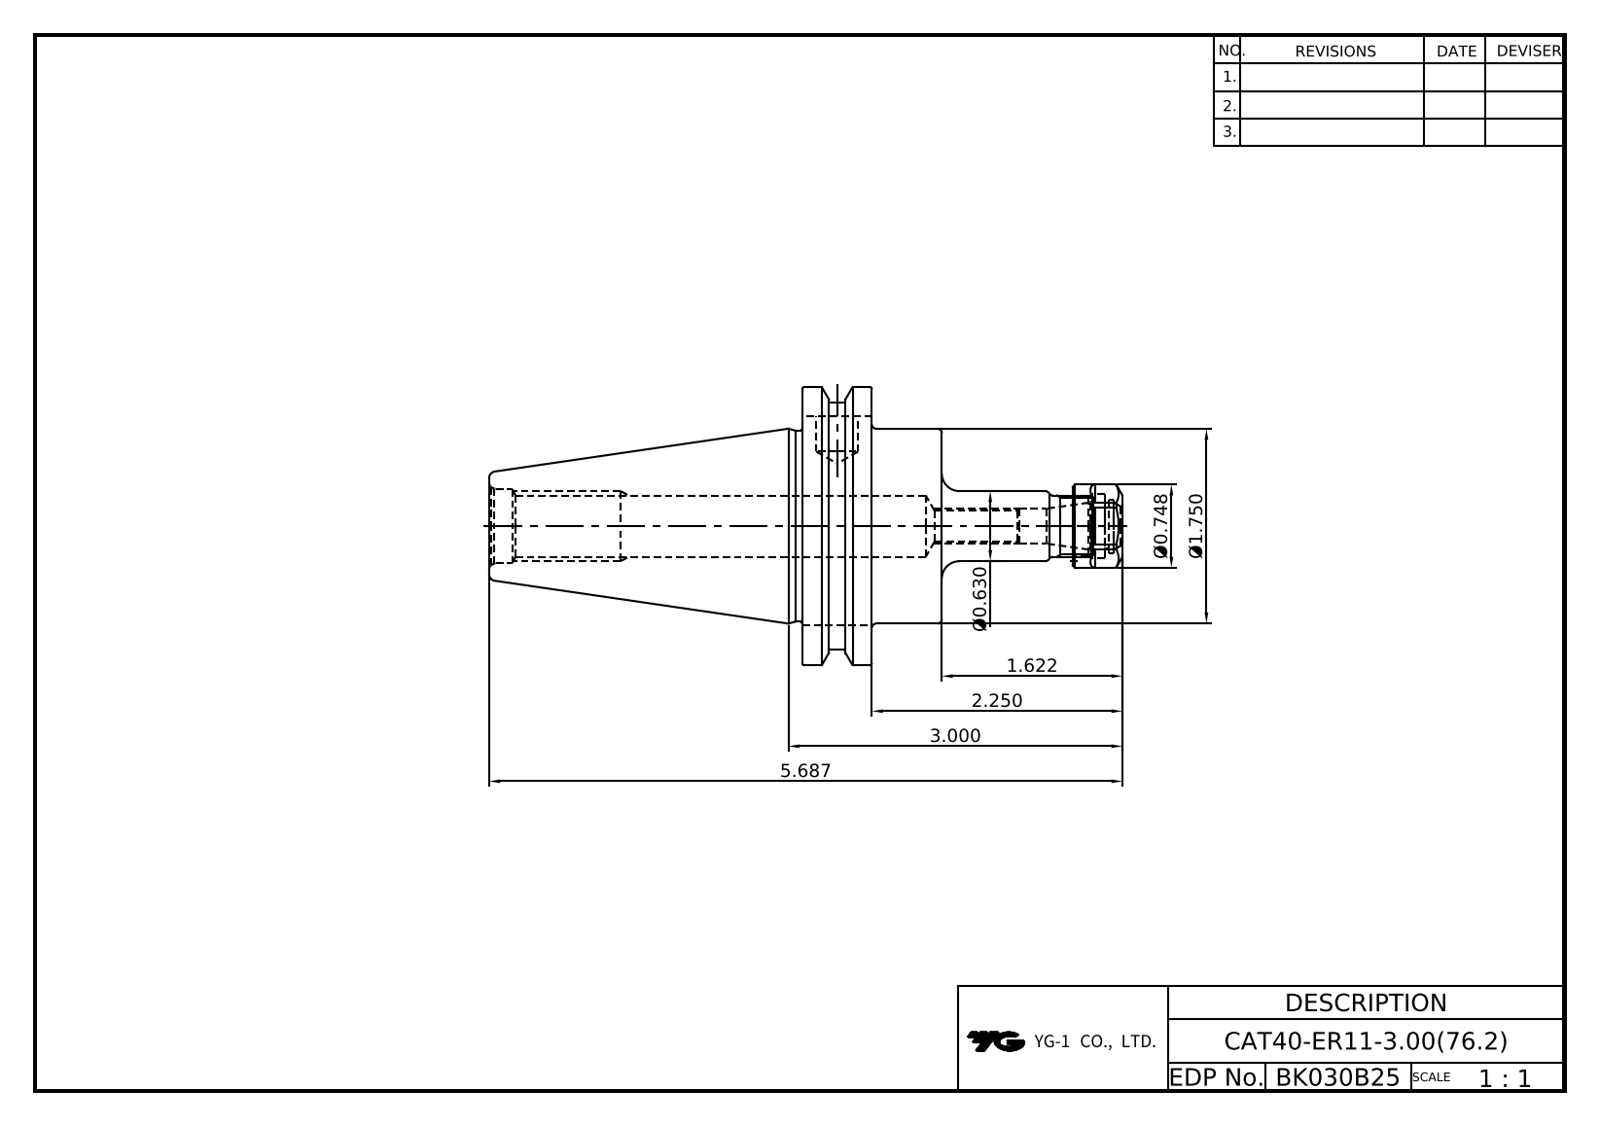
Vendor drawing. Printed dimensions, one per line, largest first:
5.687
3.000
2.250
Ø1.750
1.622
Ø0.748
Ø0.630
